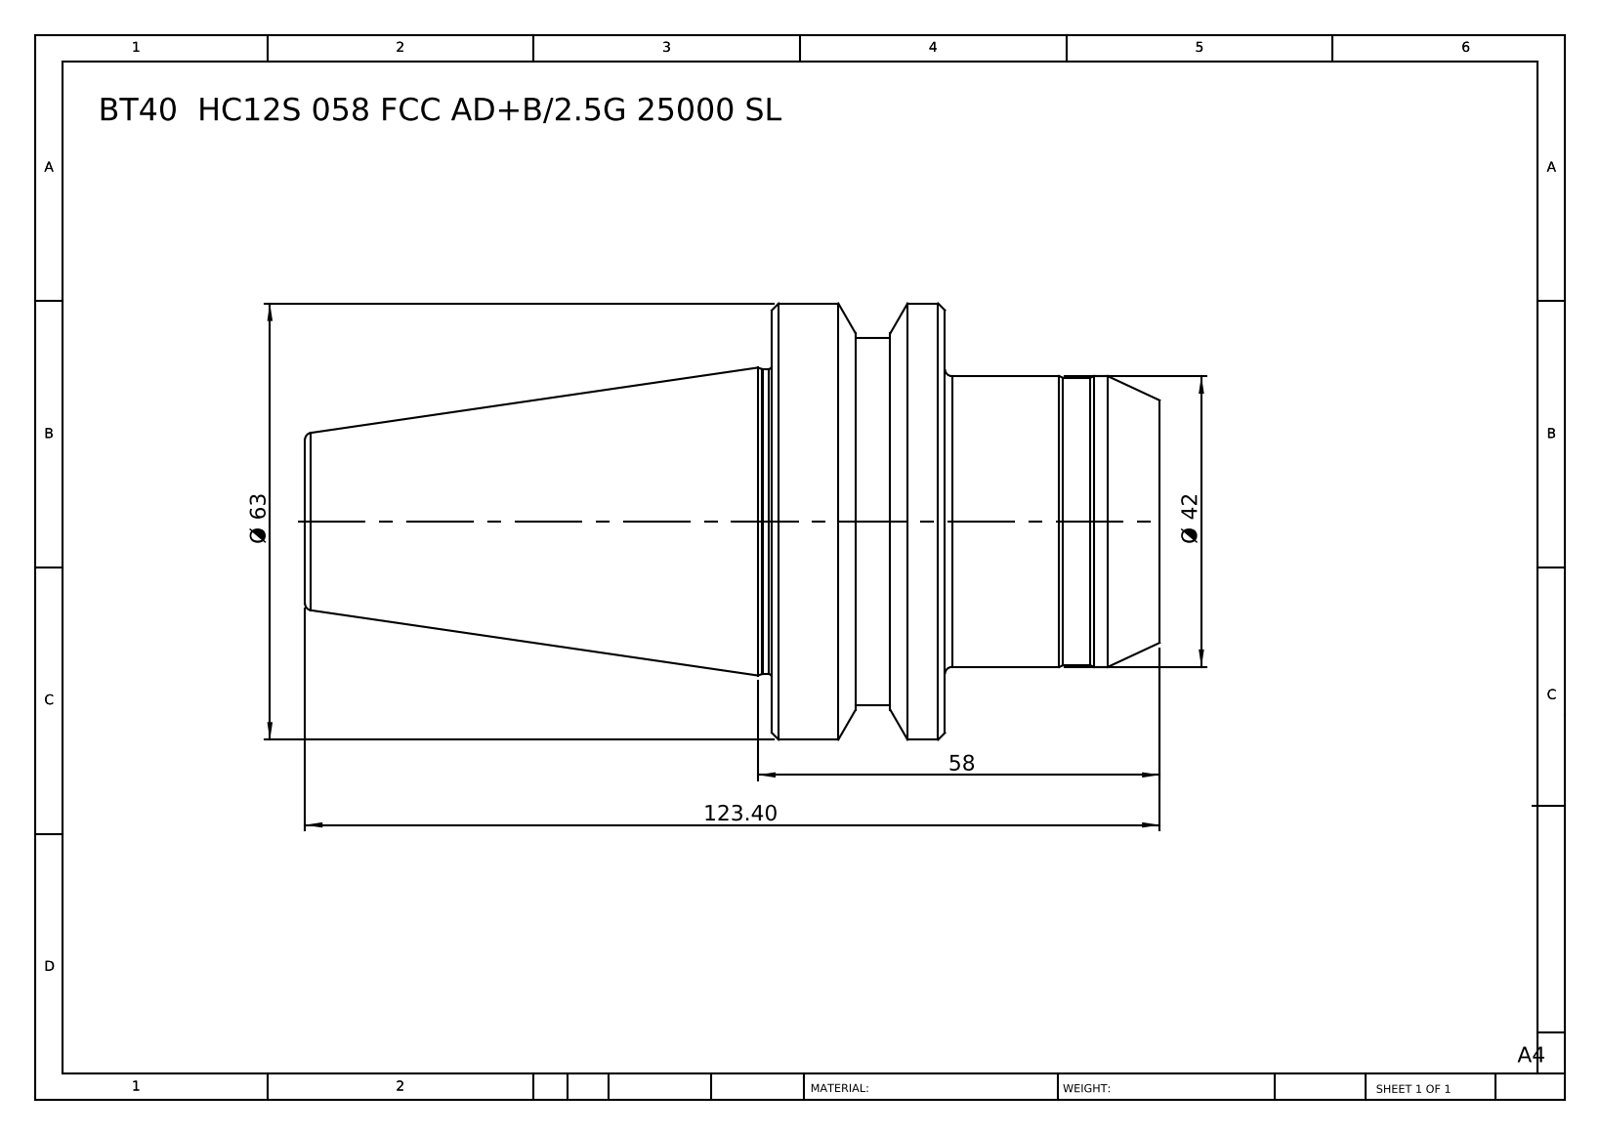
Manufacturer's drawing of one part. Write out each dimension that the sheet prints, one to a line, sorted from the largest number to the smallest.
123.40
Ø 63
58
Ø 42
